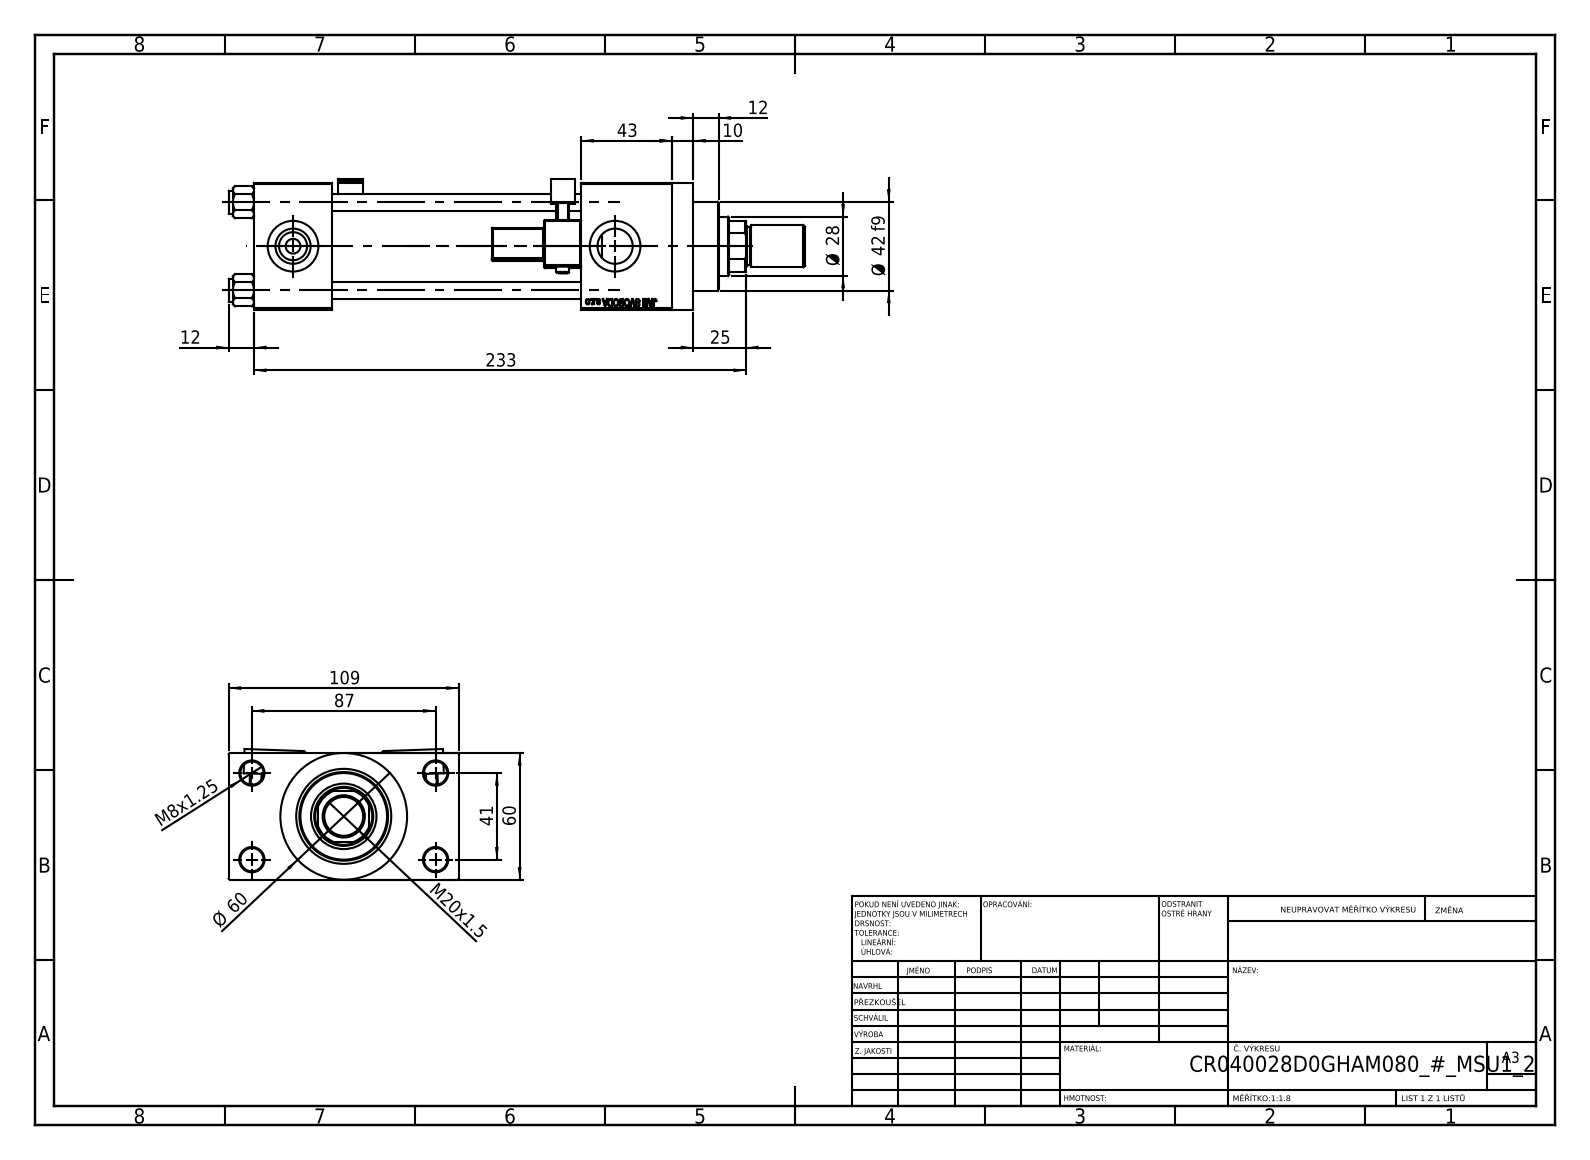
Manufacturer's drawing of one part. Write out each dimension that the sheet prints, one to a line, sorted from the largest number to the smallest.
233
109
87
Ø 60
60
43
Ø 42 f9
41
Ø 28
25
M20x1.5
12
12
10
M8x1.25
